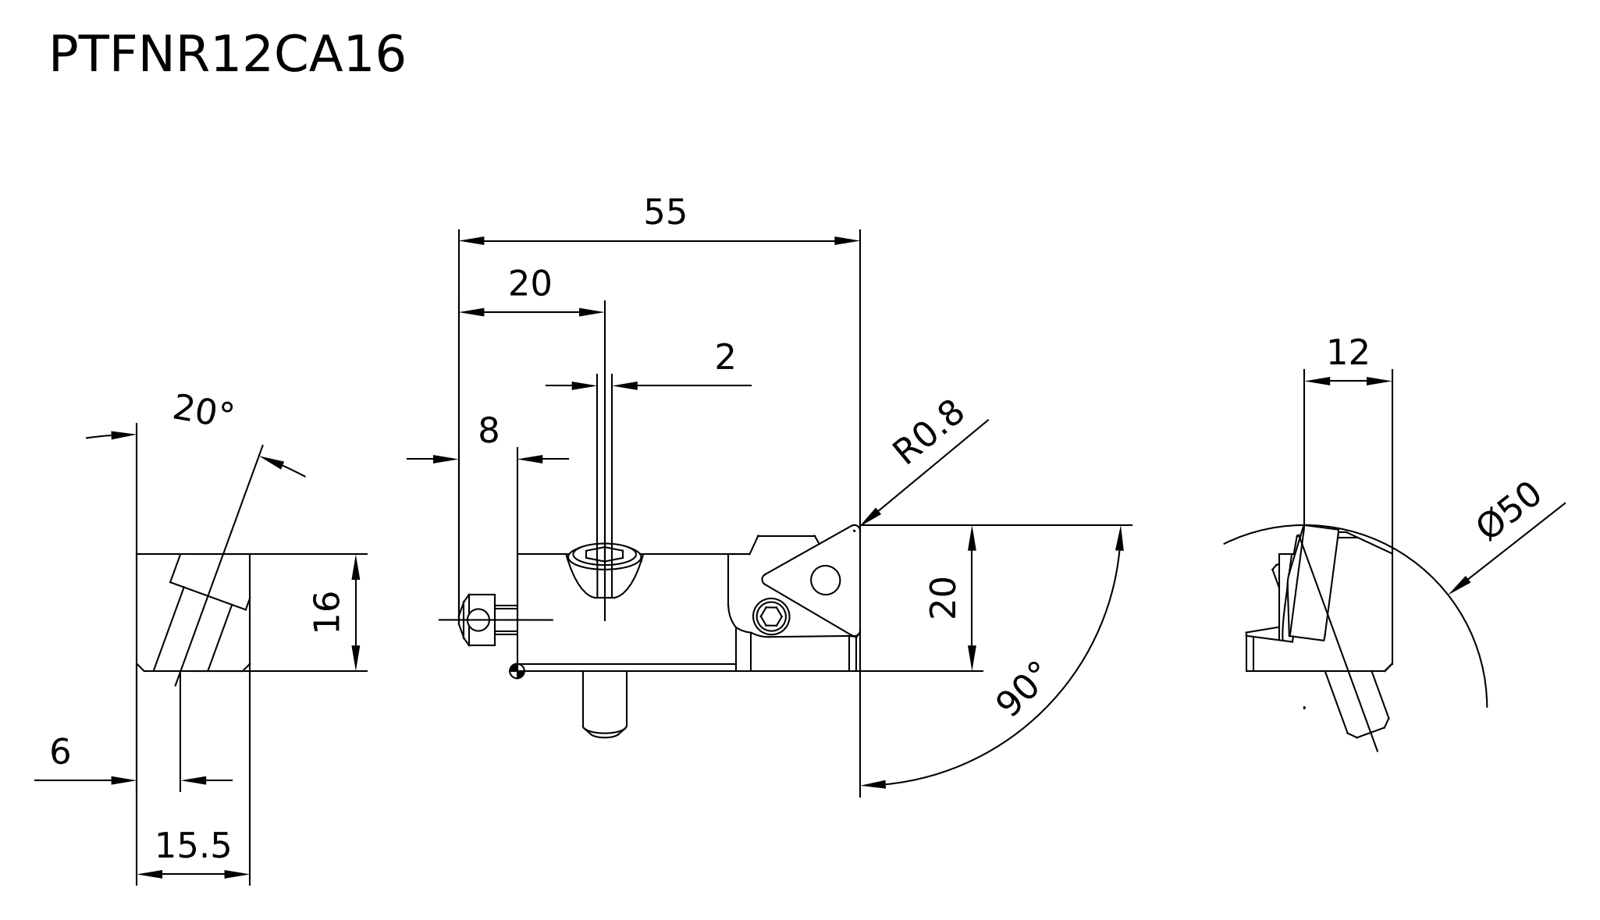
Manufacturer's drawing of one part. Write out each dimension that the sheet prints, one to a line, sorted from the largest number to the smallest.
90°
55
Ø50
20
20°
20
16
15.5
12
8
6
2
R0.8
